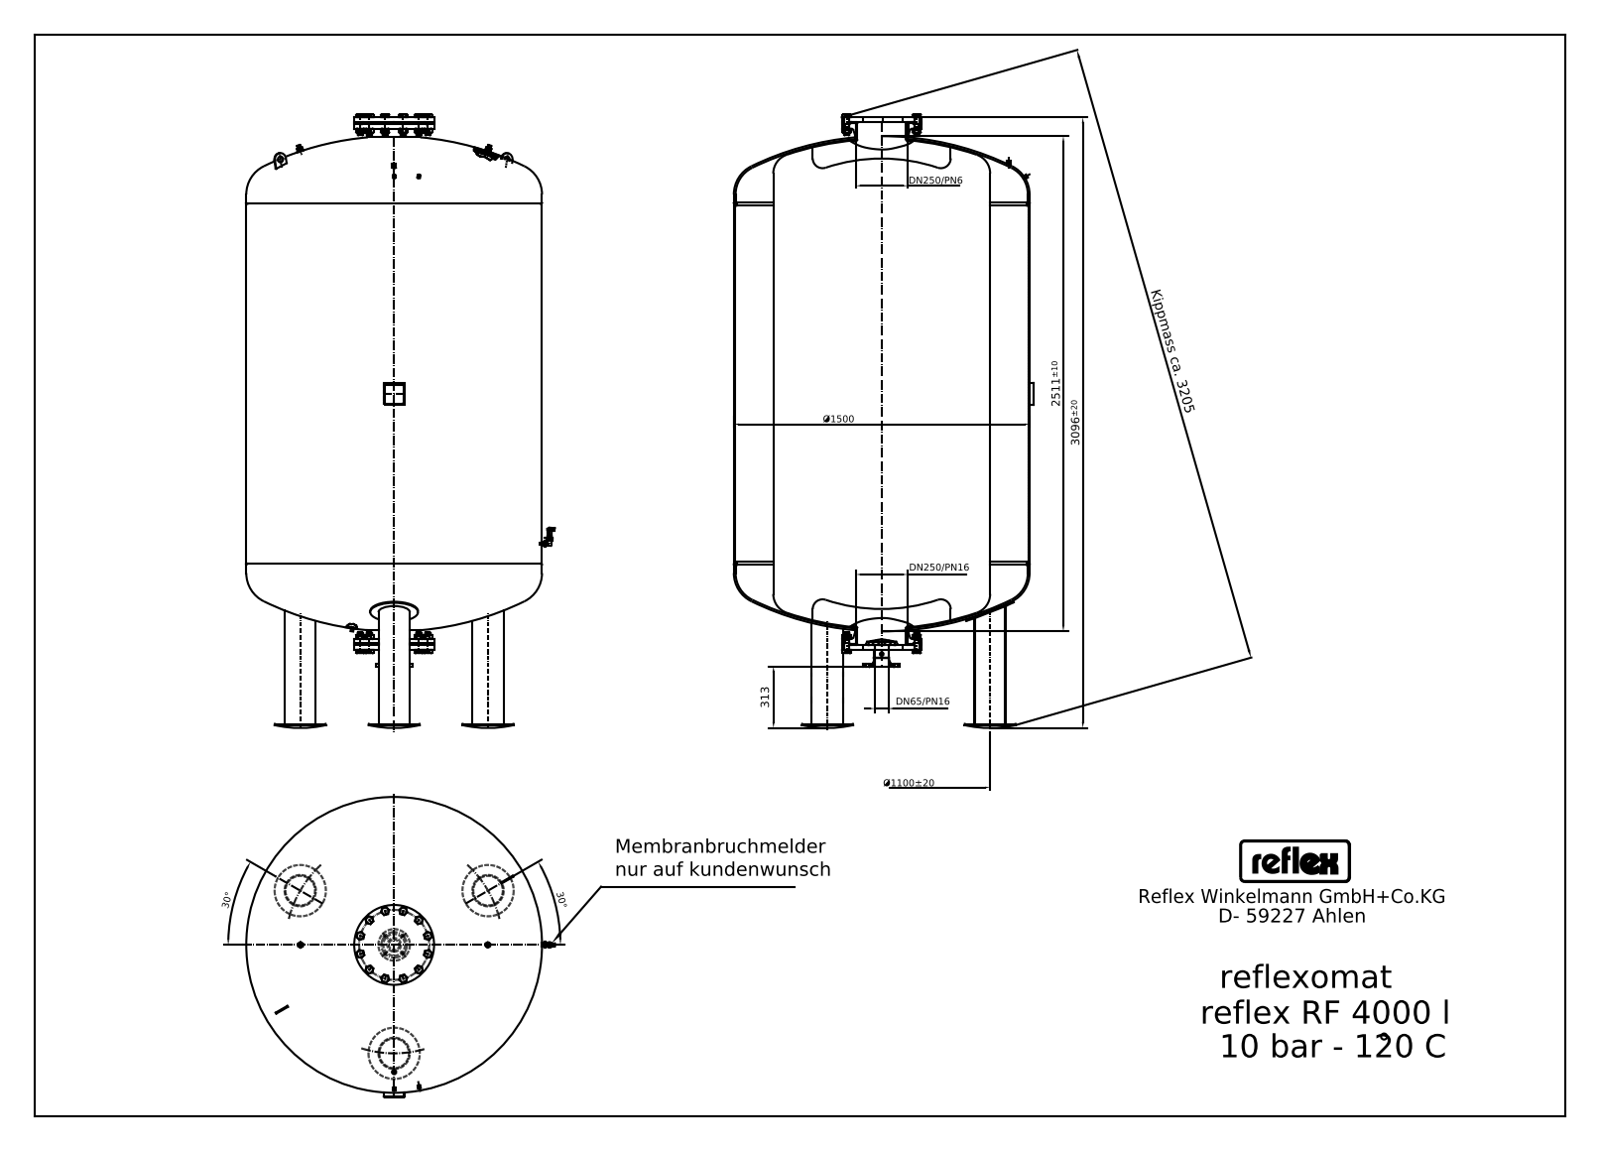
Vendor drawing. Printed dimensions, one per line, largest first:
Kippmass ca. 3205
3096±20
2511±10
Ø1500
Ø1100±20
313
DN250/PN6
DN250/PN16
DN65/PN16
30°
30°
